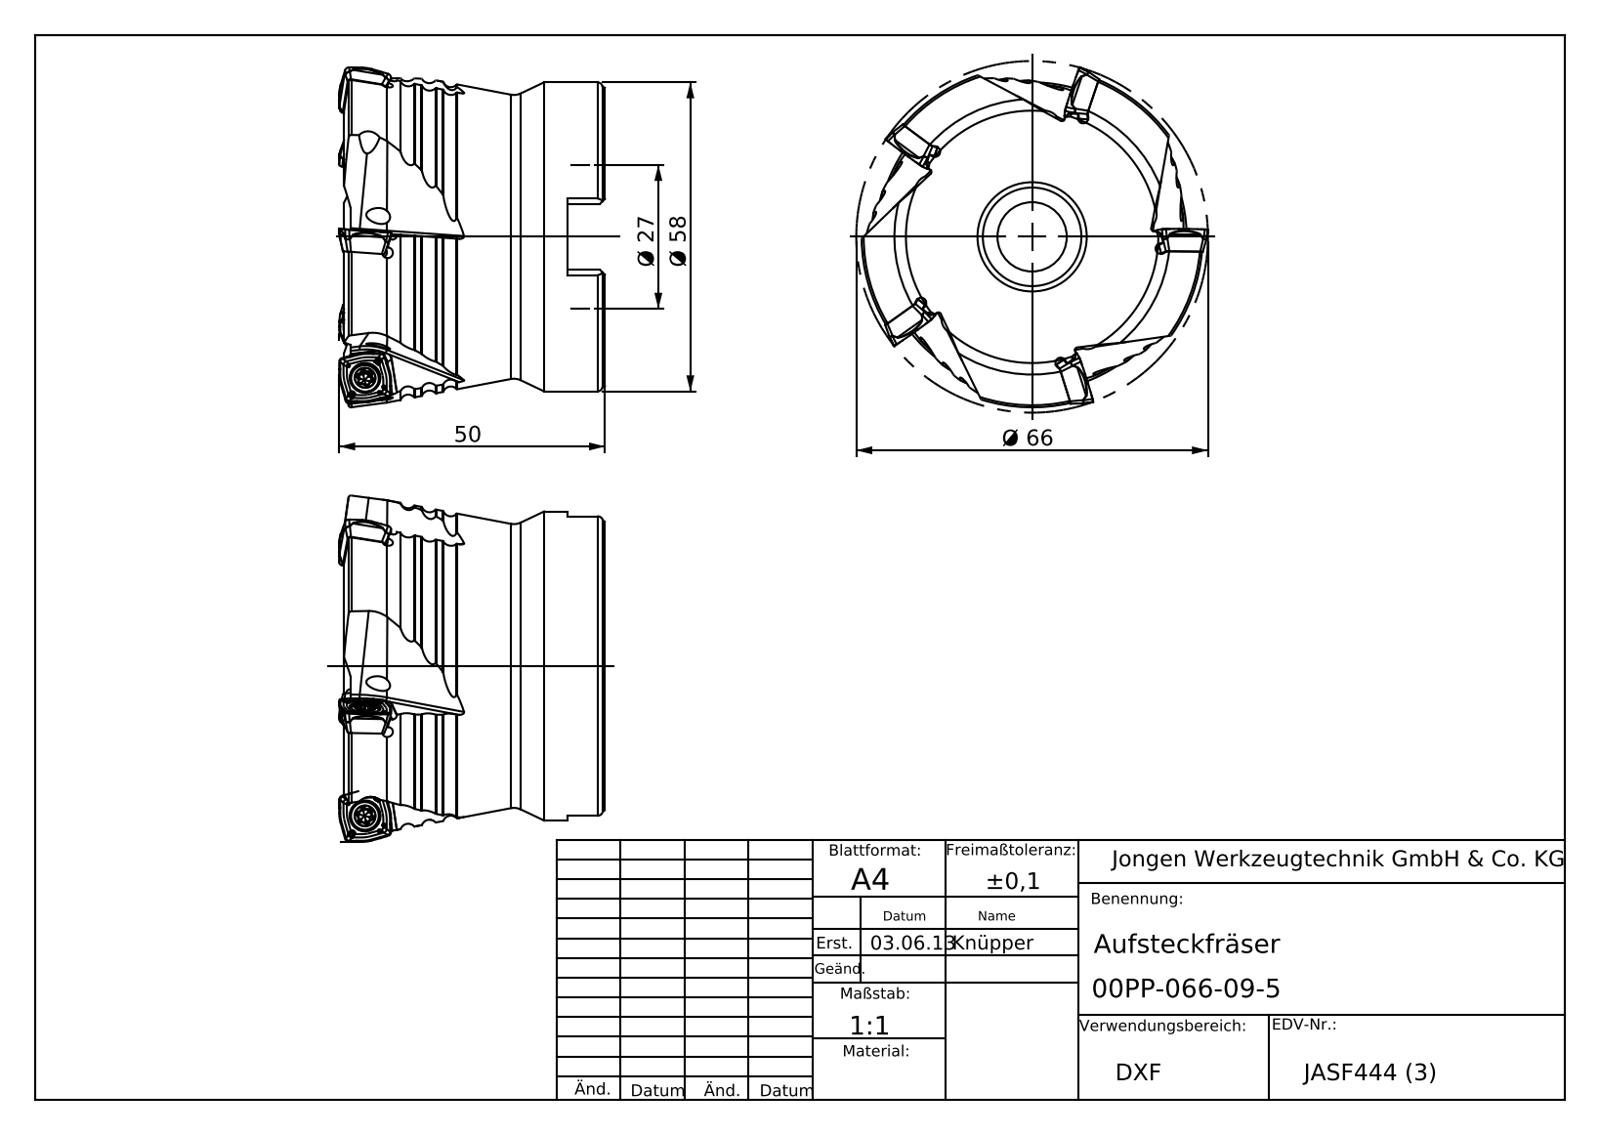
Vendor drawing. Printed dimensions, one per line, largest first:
Ø 66
Ø 58
50
Ø 27
